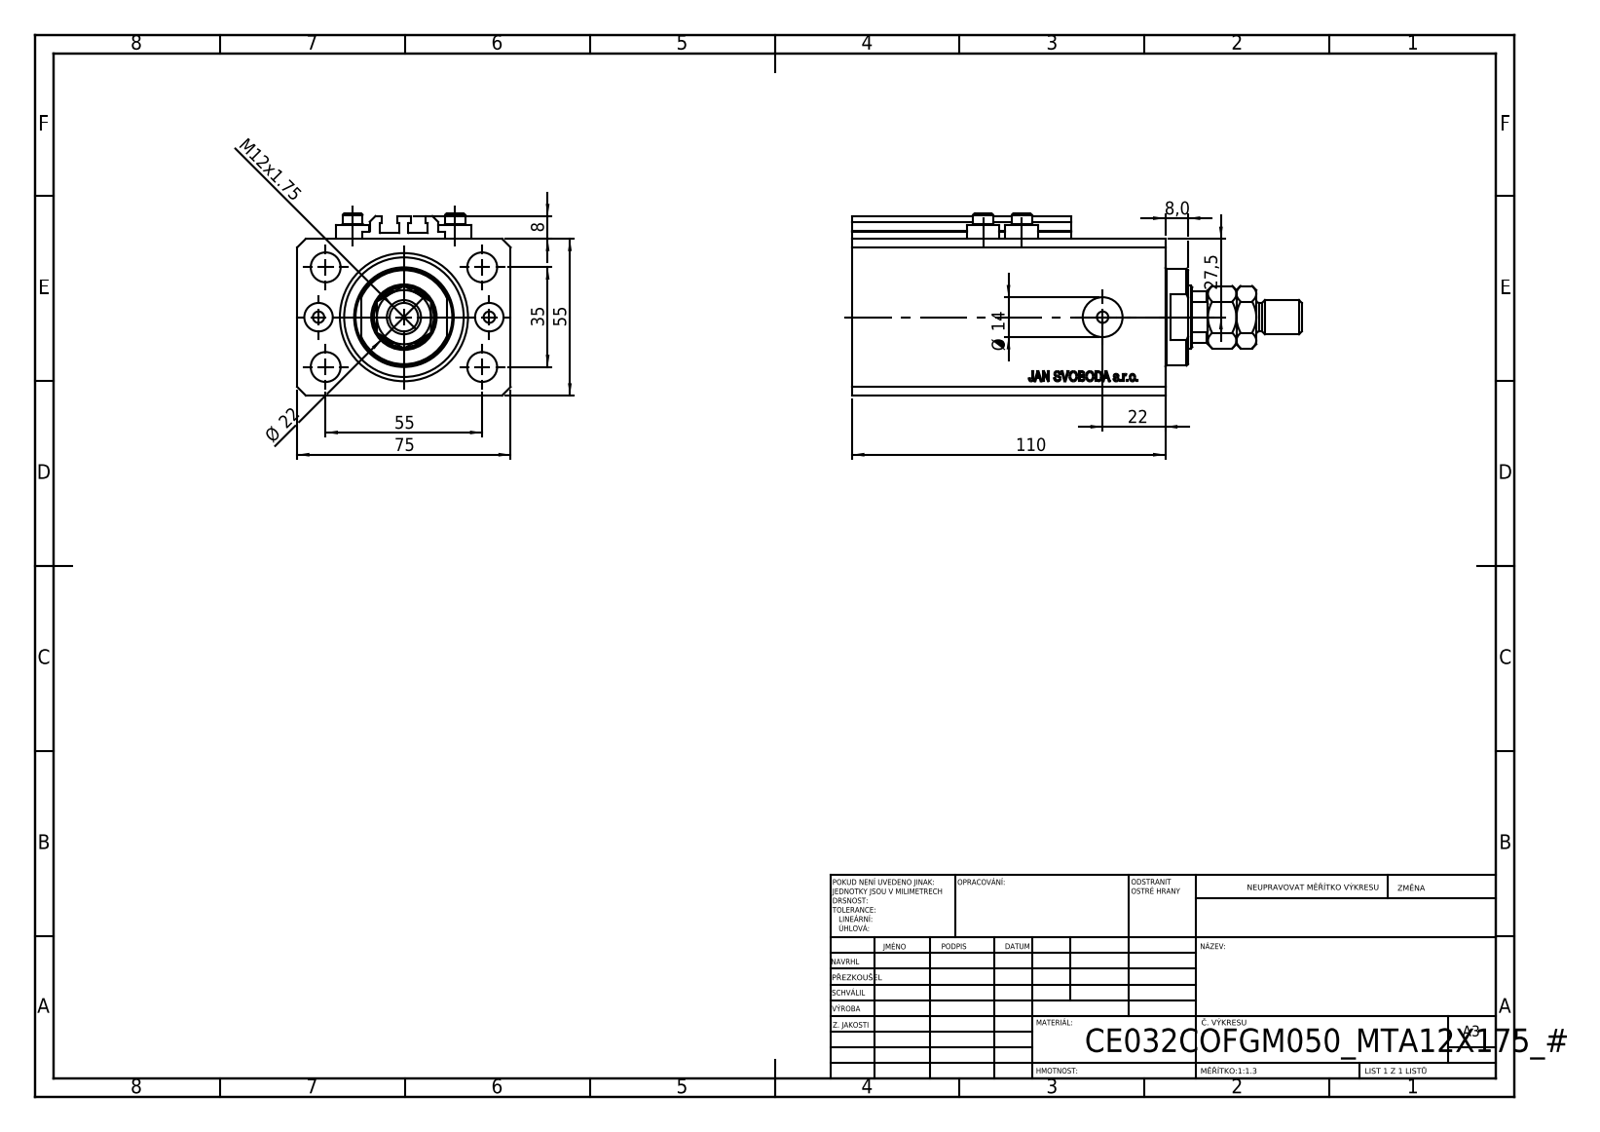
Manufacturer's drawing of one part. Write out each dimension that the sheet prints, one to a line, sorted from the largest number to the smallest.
110
75
55
55
35
27,5
Ø 22
22
Ø 14
M12x1.75
8
8,0
